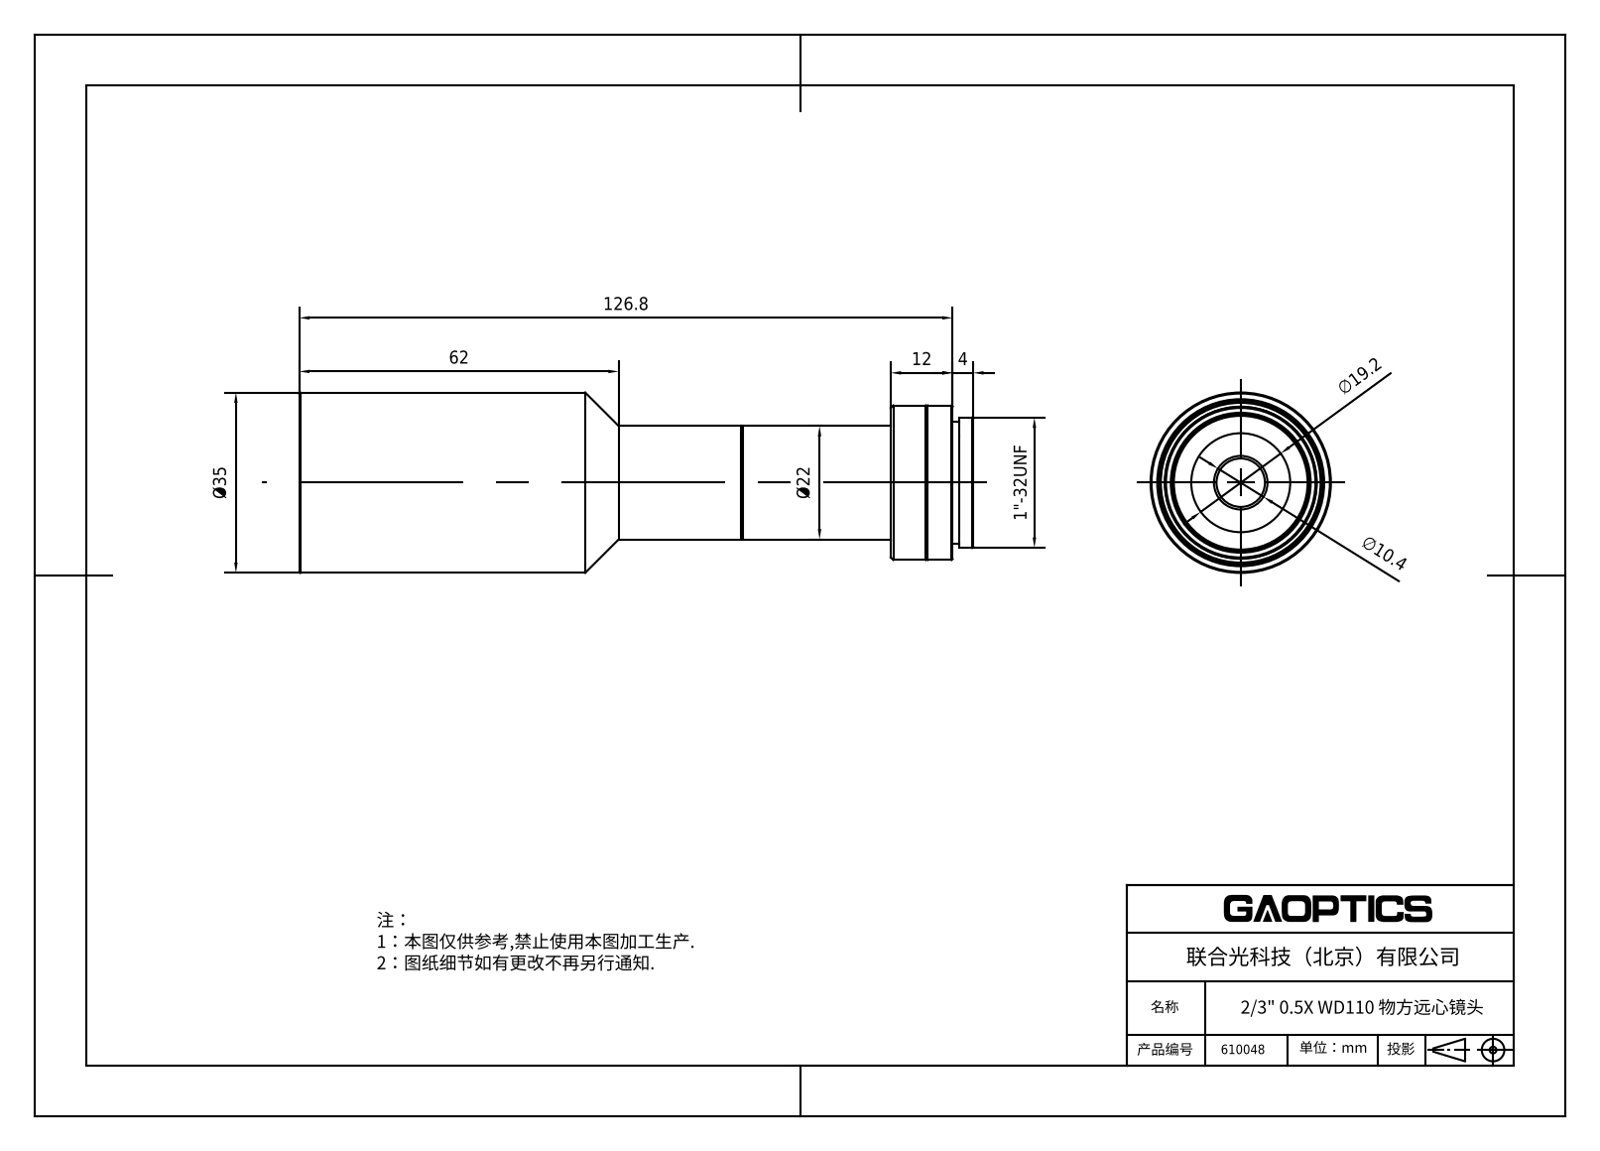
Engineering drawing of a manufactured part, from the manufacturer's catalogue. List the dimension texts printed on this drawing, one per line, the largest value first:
126.8
62
Ø35
Ø22
∅19.2
12
∅10.4
4
1"-32UNF
